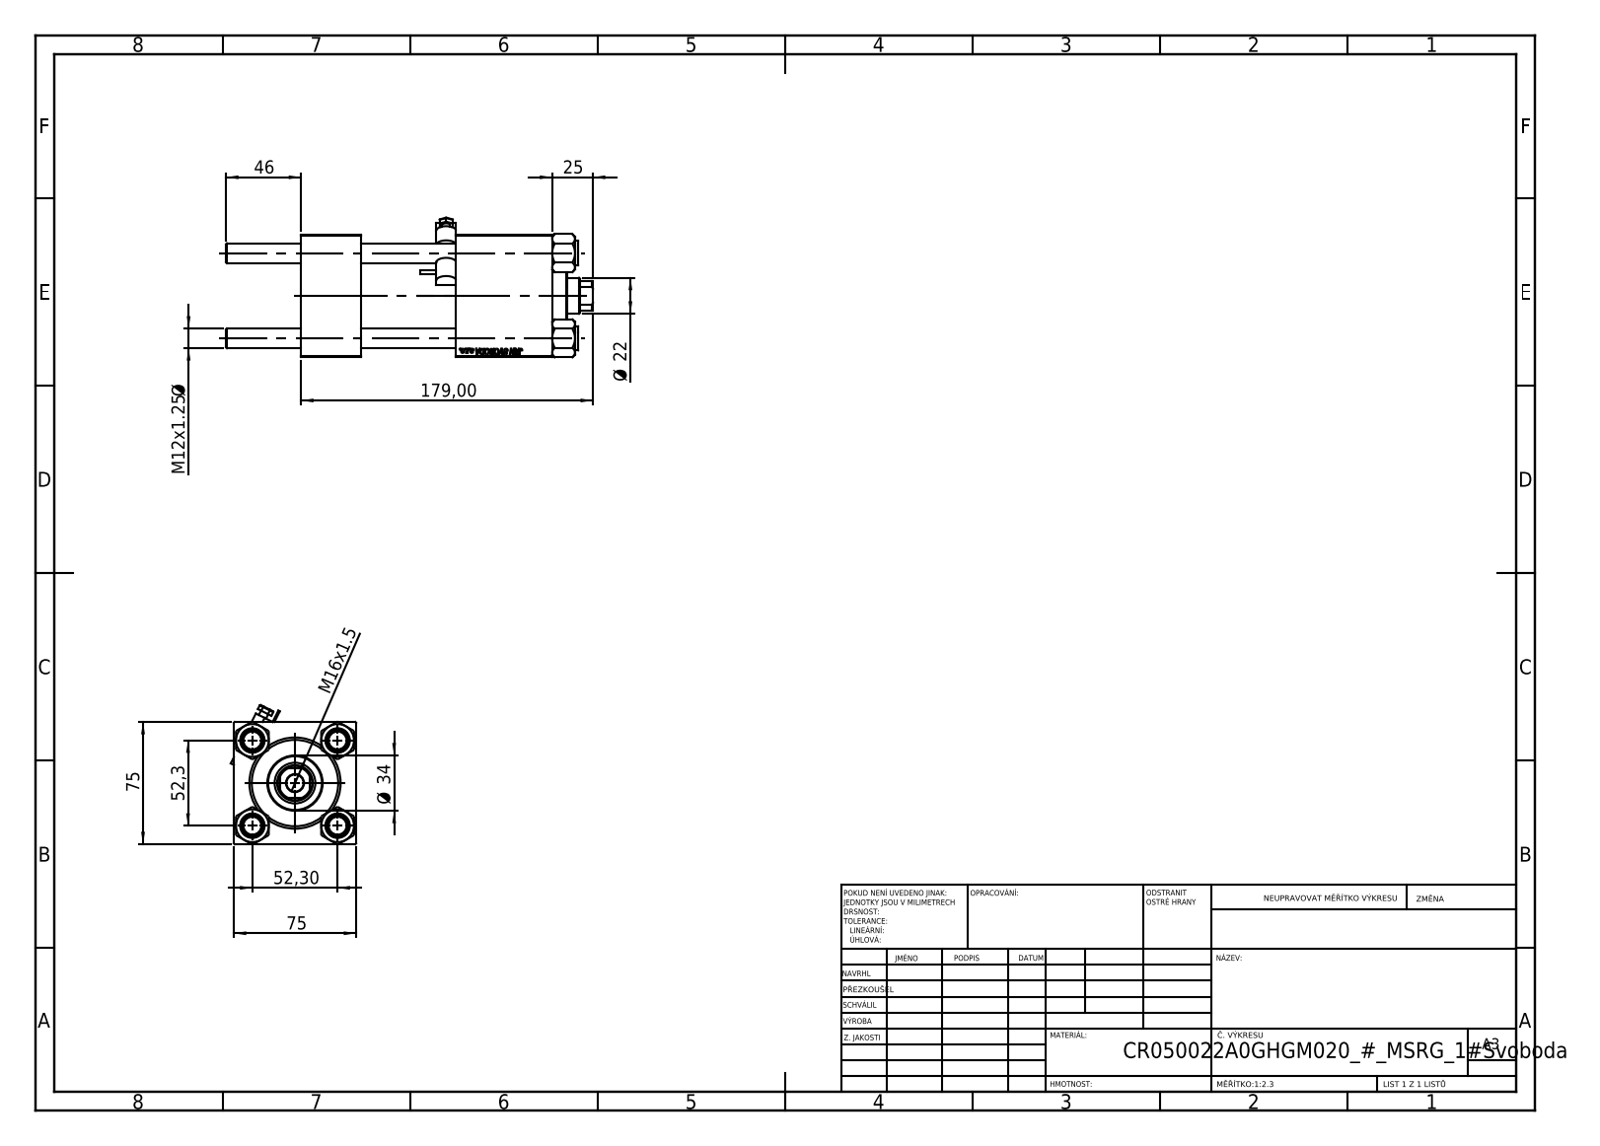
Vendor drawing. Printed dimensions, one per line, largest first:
179,00
75
75
52,3
52,30
46
Ø 34
25
Ø 22
M16x1.5
M12x1.25 Ø
